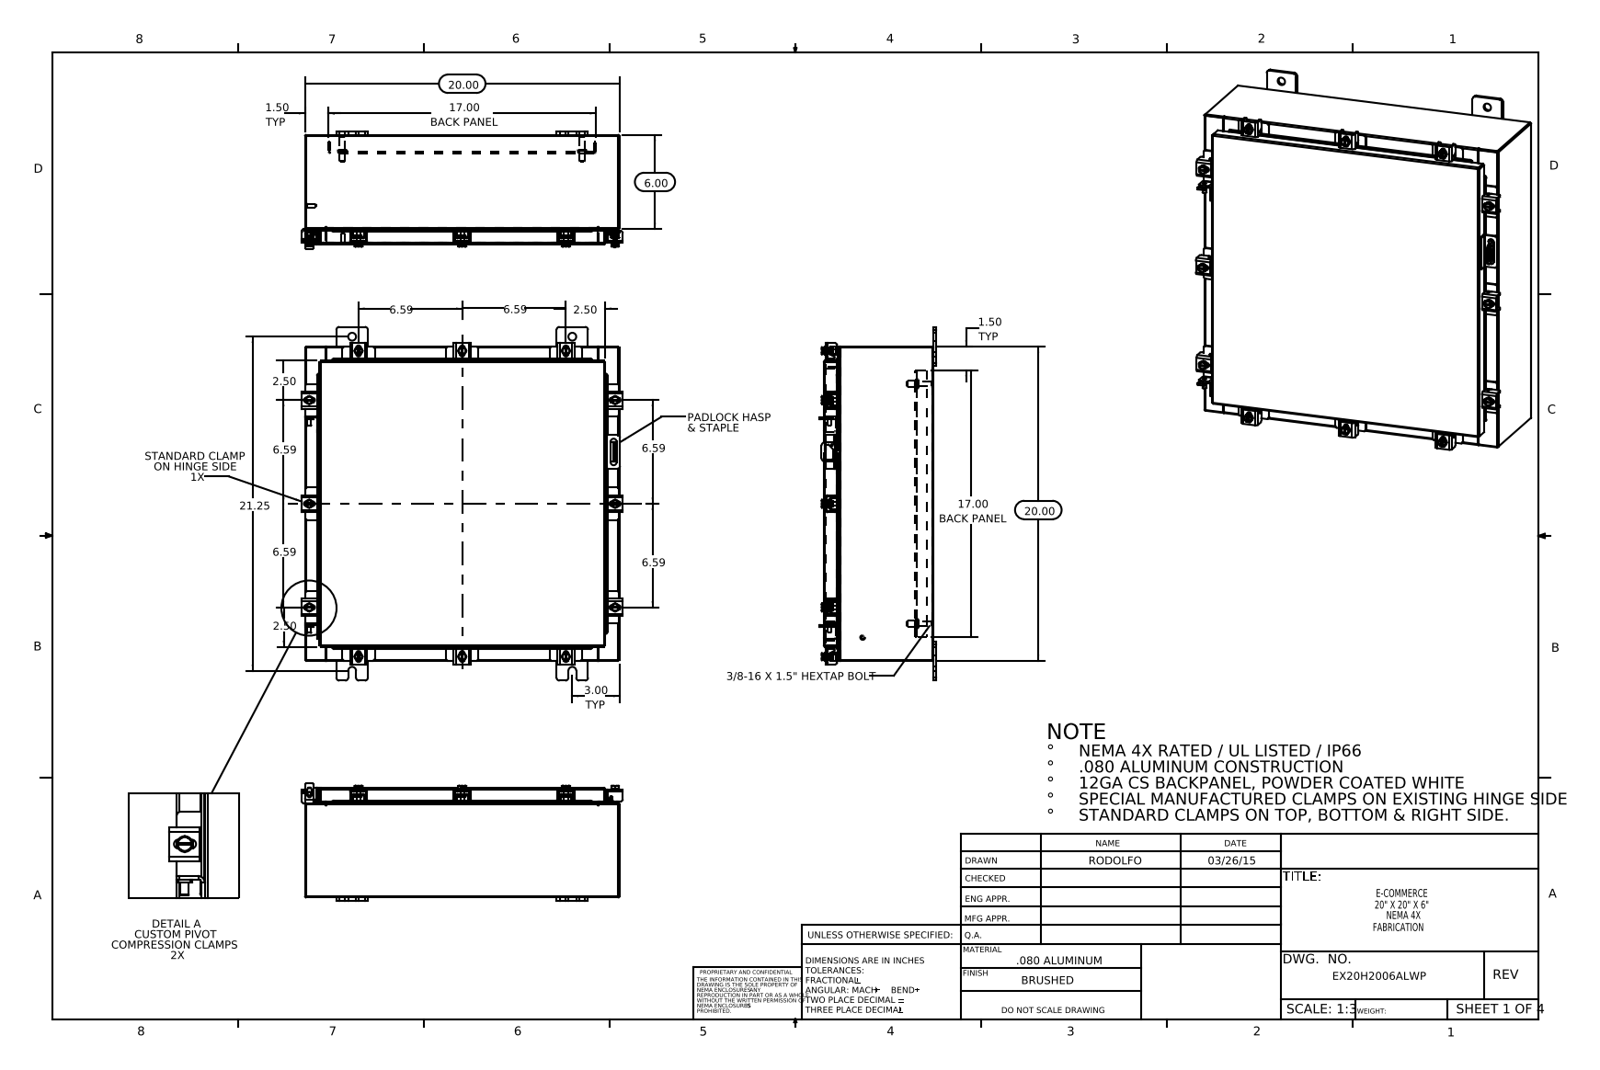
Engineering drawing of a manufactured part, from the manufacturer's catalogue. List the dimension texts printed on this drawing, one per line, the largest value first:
21.25
20.00
20.00
17.00 BACK PANEL
17.00 BACK PANEL
6.59
6.59
6.59
6.59
6.59
6.59
6.00
3.00 TYP
2.50
2.50
2.50
1.50 TYP
1.50 TYP
